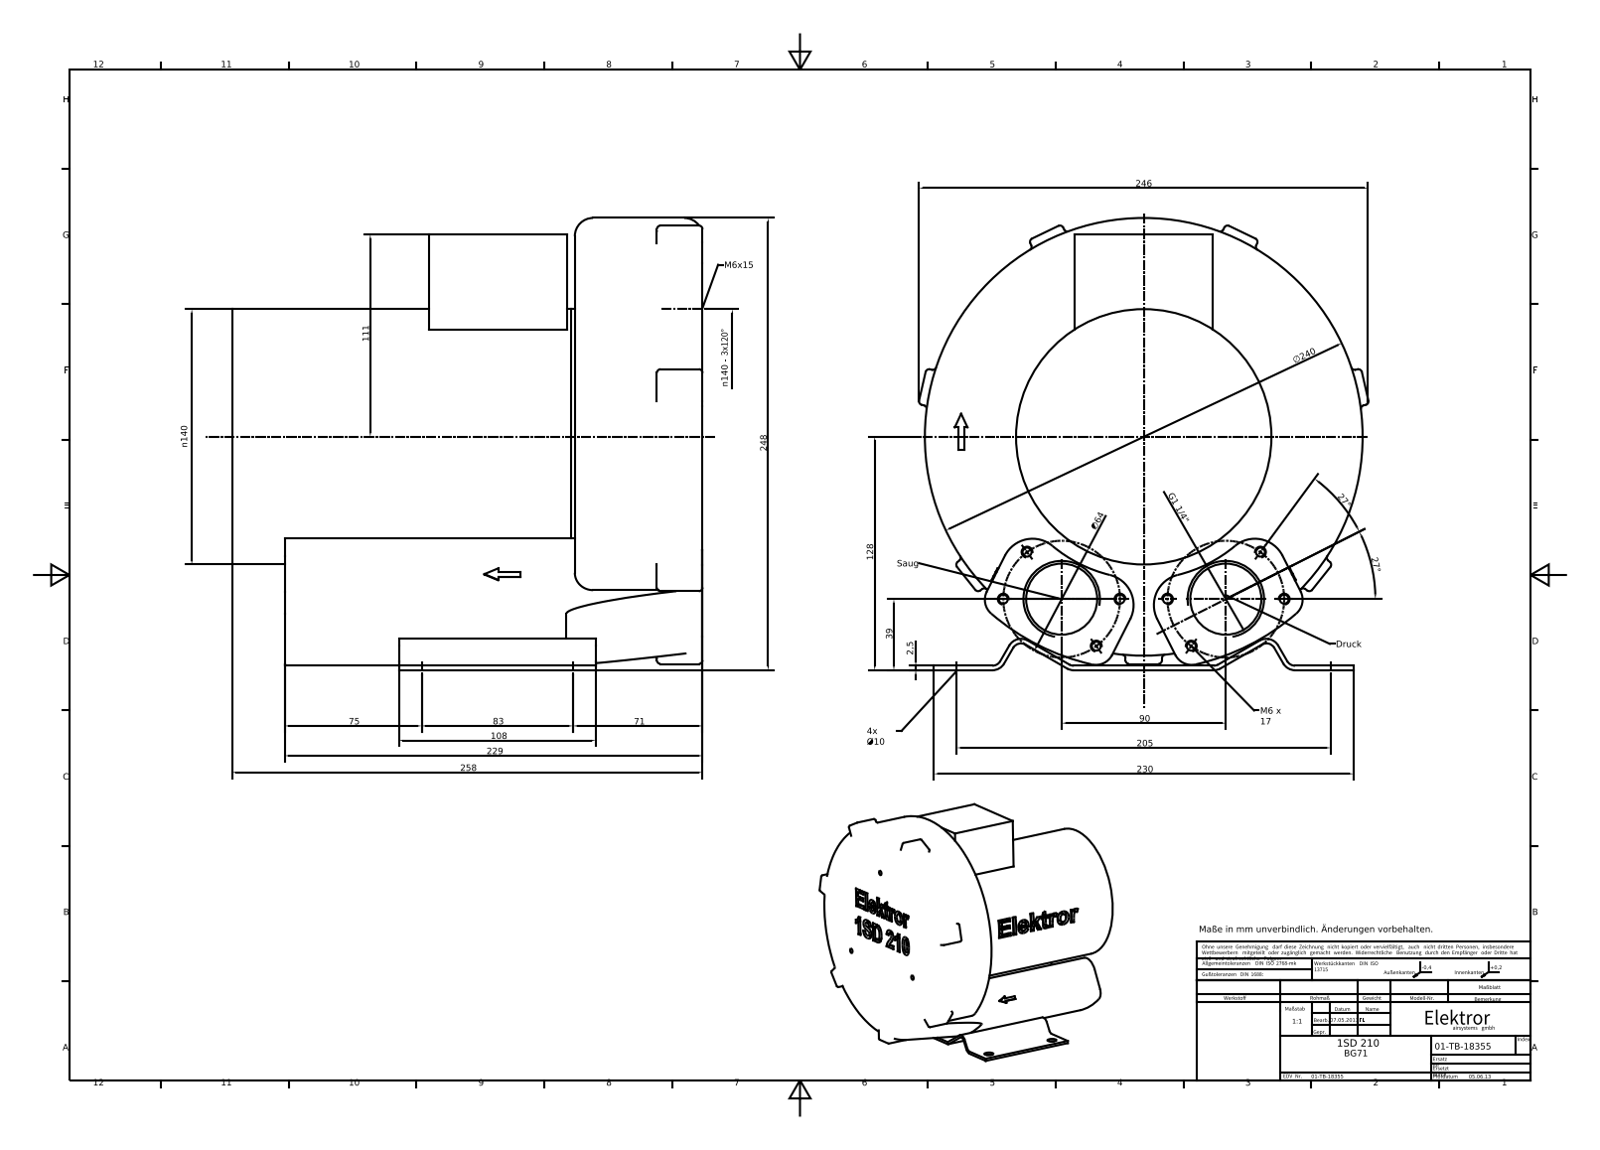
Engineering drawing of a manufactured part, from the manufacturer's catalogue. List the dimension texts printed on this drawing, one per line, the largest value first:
258
248
246
∅240
230
229
205
n140
n140 - 3x120°
128
111
108
90
83
75
71
∅64
39
27°
27°
2,5
G1 1/4"
